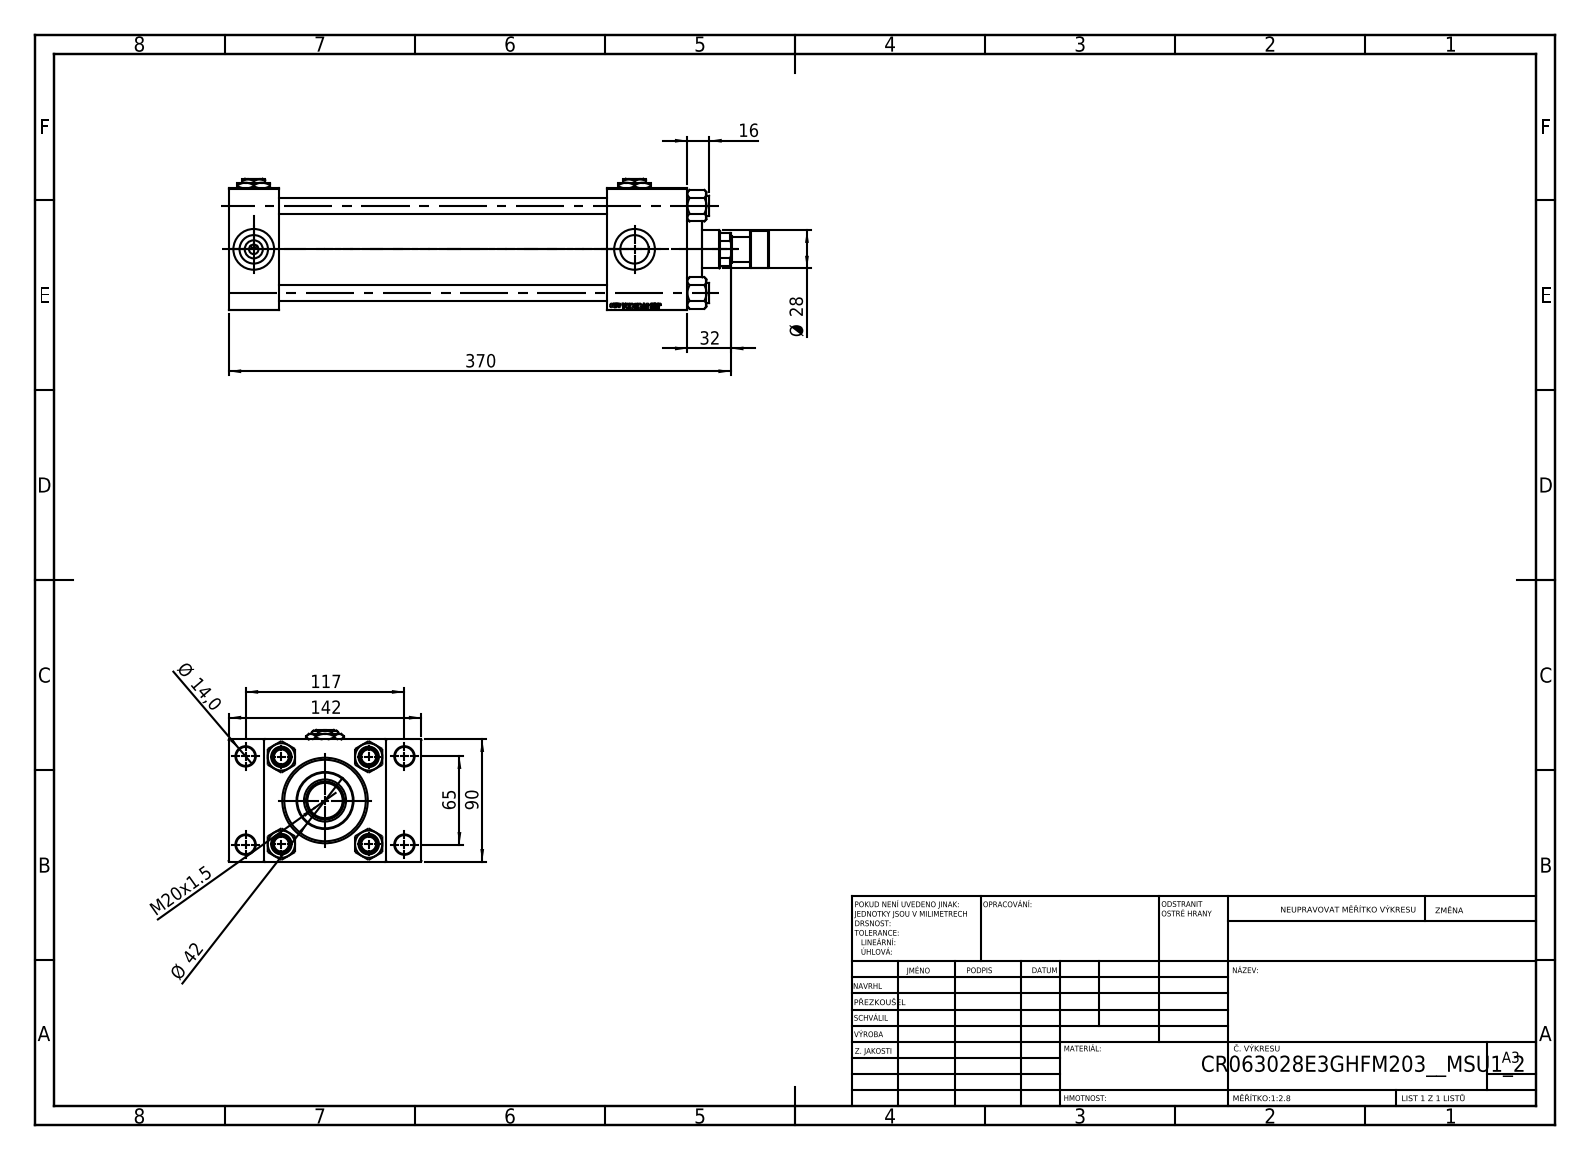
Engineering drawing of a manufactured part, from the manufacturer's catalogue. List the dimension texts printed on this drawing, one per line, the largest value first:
370
142
117
90
65
Ø 42
32
Ø 28
M20x1.5
16
Ø 14,0
